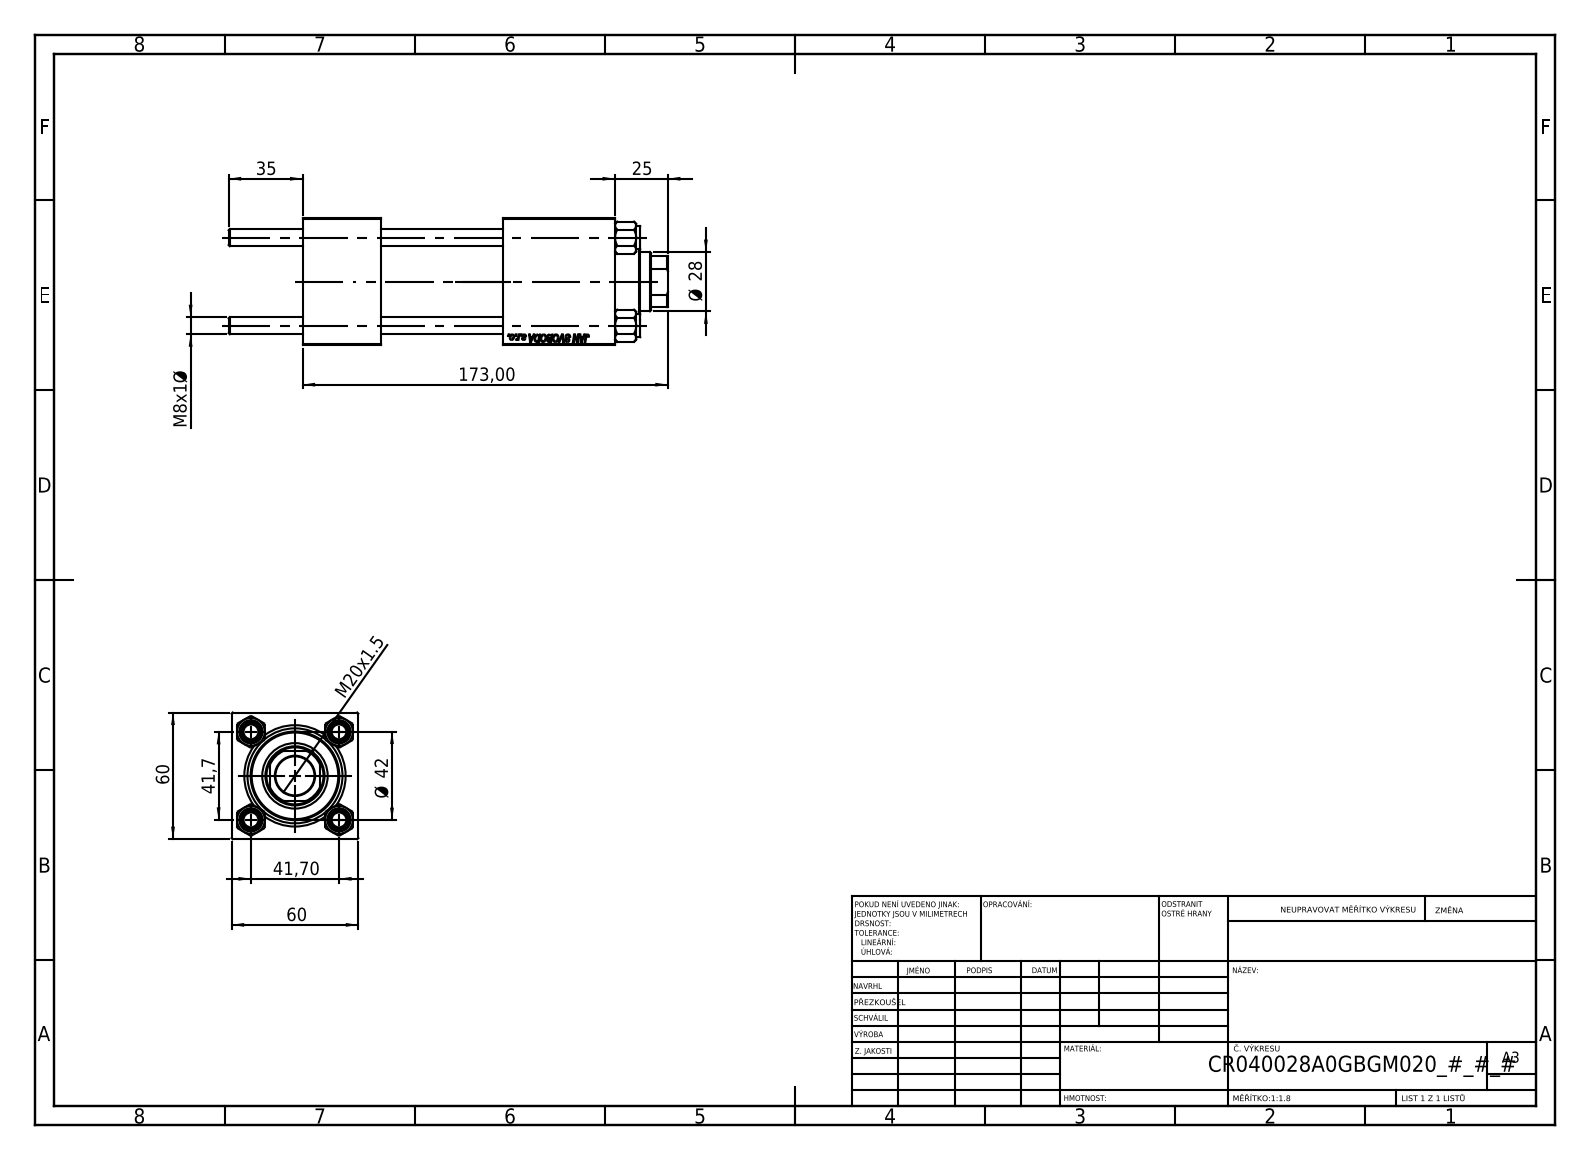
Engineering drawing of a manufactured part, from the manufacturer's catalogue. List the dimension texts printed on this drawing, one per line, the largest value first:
173,00
60
60
Ø 42
41,7
41,70
35
Ø 28
25
M20x1.5
M8x1 Ø
